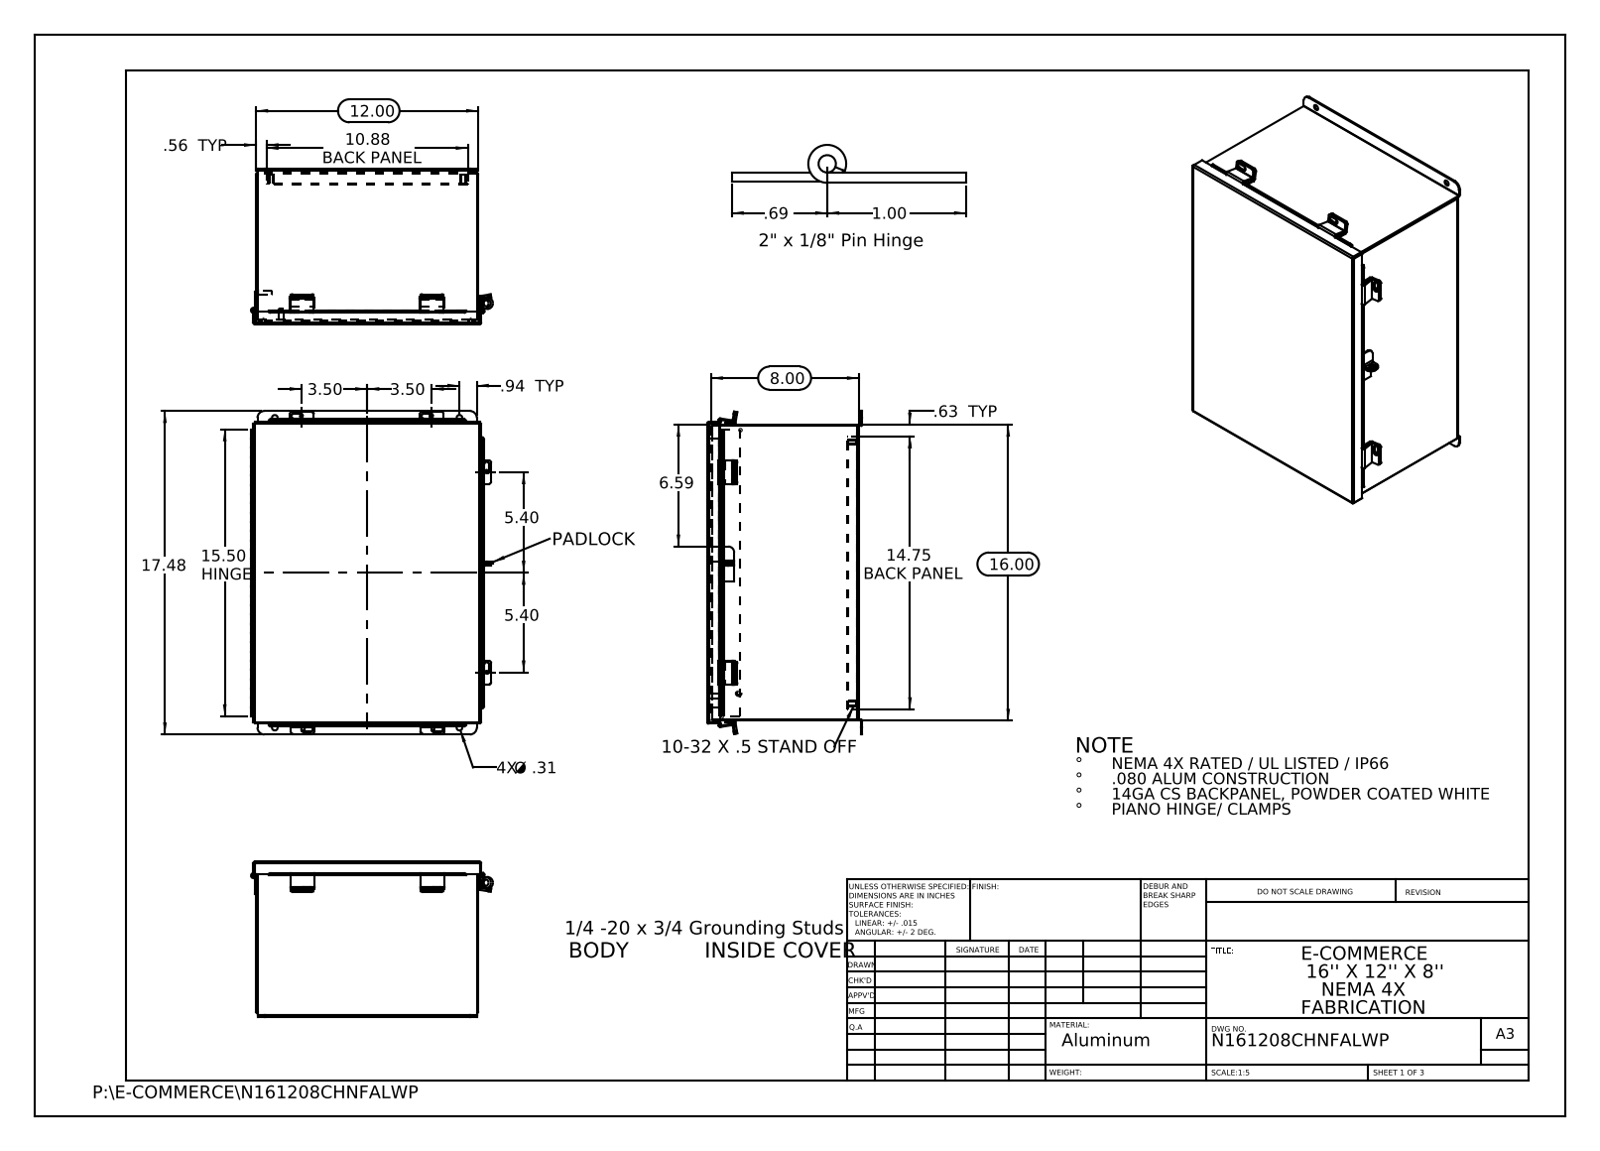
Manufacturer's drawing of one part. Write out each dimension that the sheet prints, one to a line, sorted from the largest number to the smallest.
17.48
16.00
15.50 HINGE
14.75 BACK PANEL
12.00
10.88 BACK PANEL
8.00
6.59
5.40
5.40
3.50
3.50
1.00
.94 TYP
.69
.63 TYP
.56 TYP
4X Ø .31
